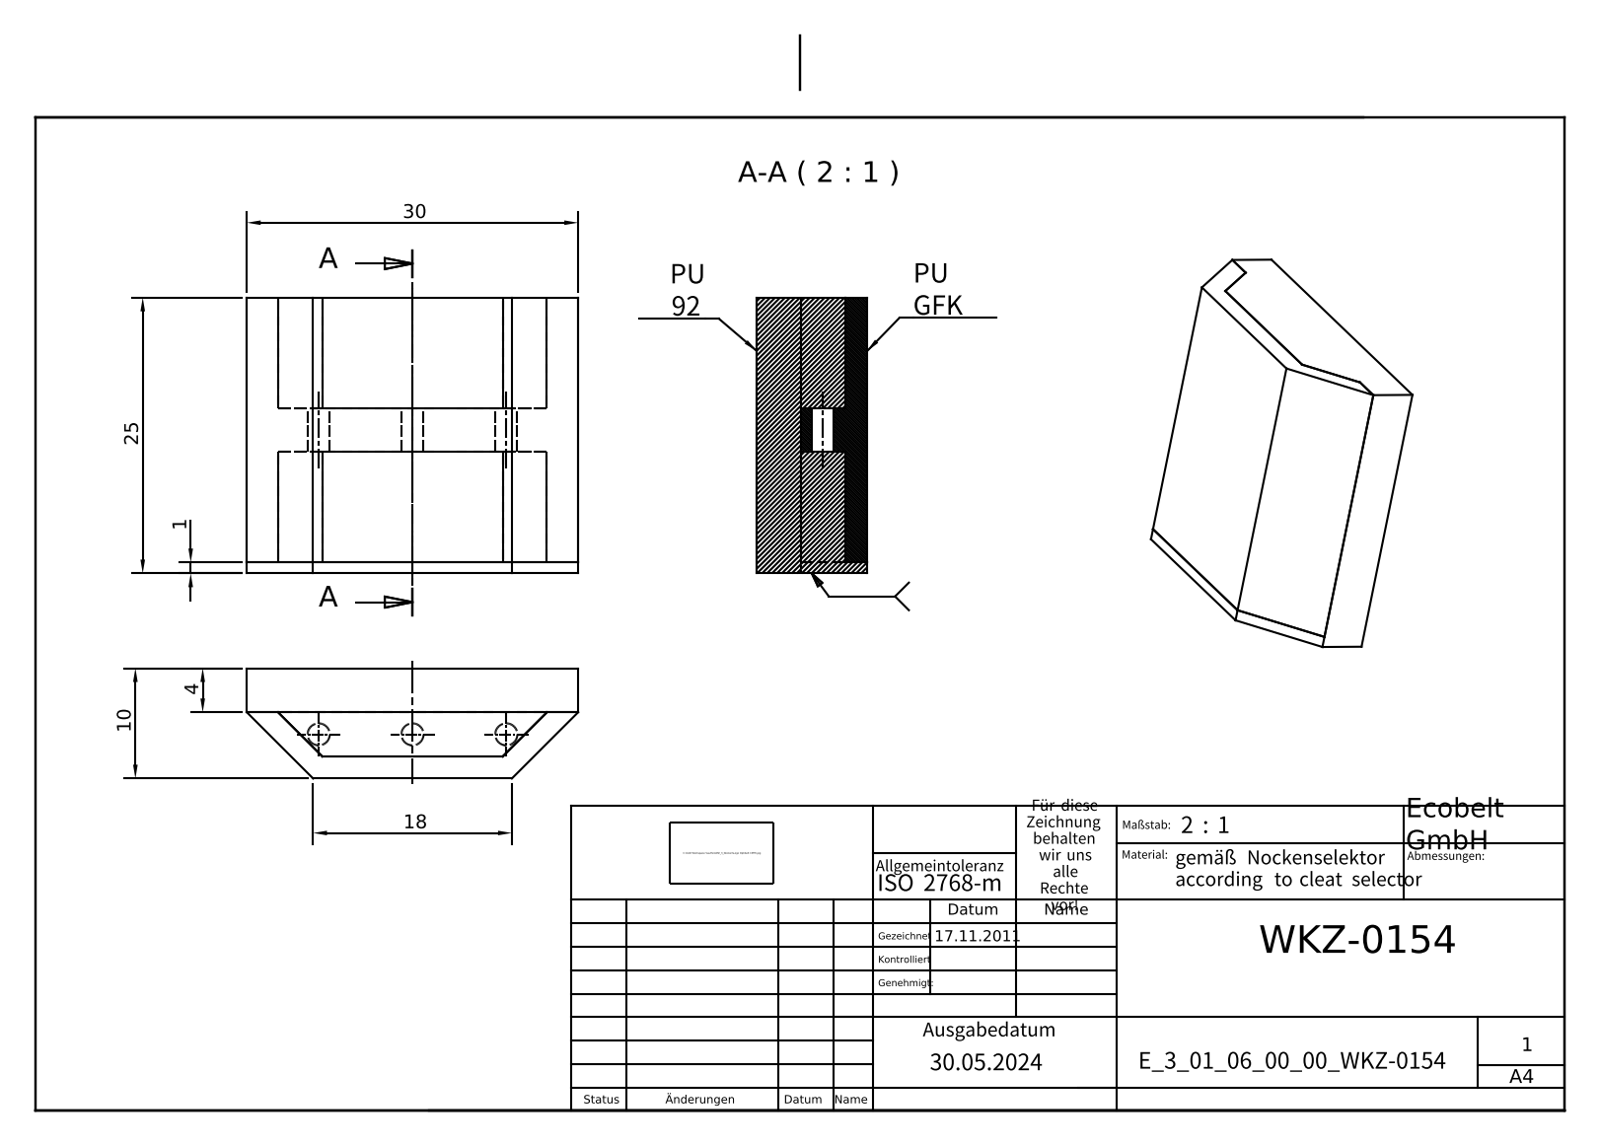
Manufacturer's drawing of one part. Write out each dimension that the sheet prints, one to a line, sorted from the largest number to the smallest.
30
25
18
10
4
1
